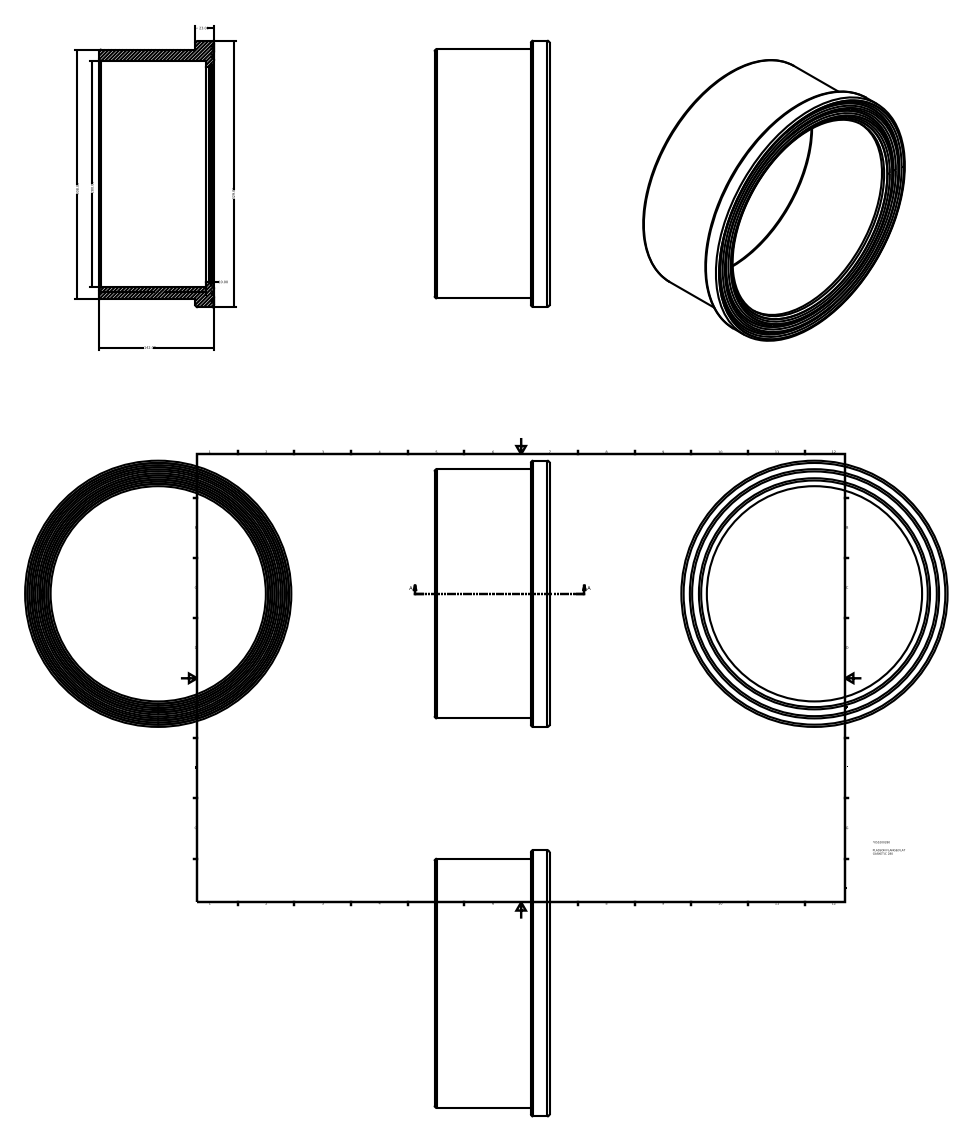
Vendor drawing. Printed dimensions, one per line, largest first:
329.00
308.00
280.00
142.00
132.00
23.00
10.00
